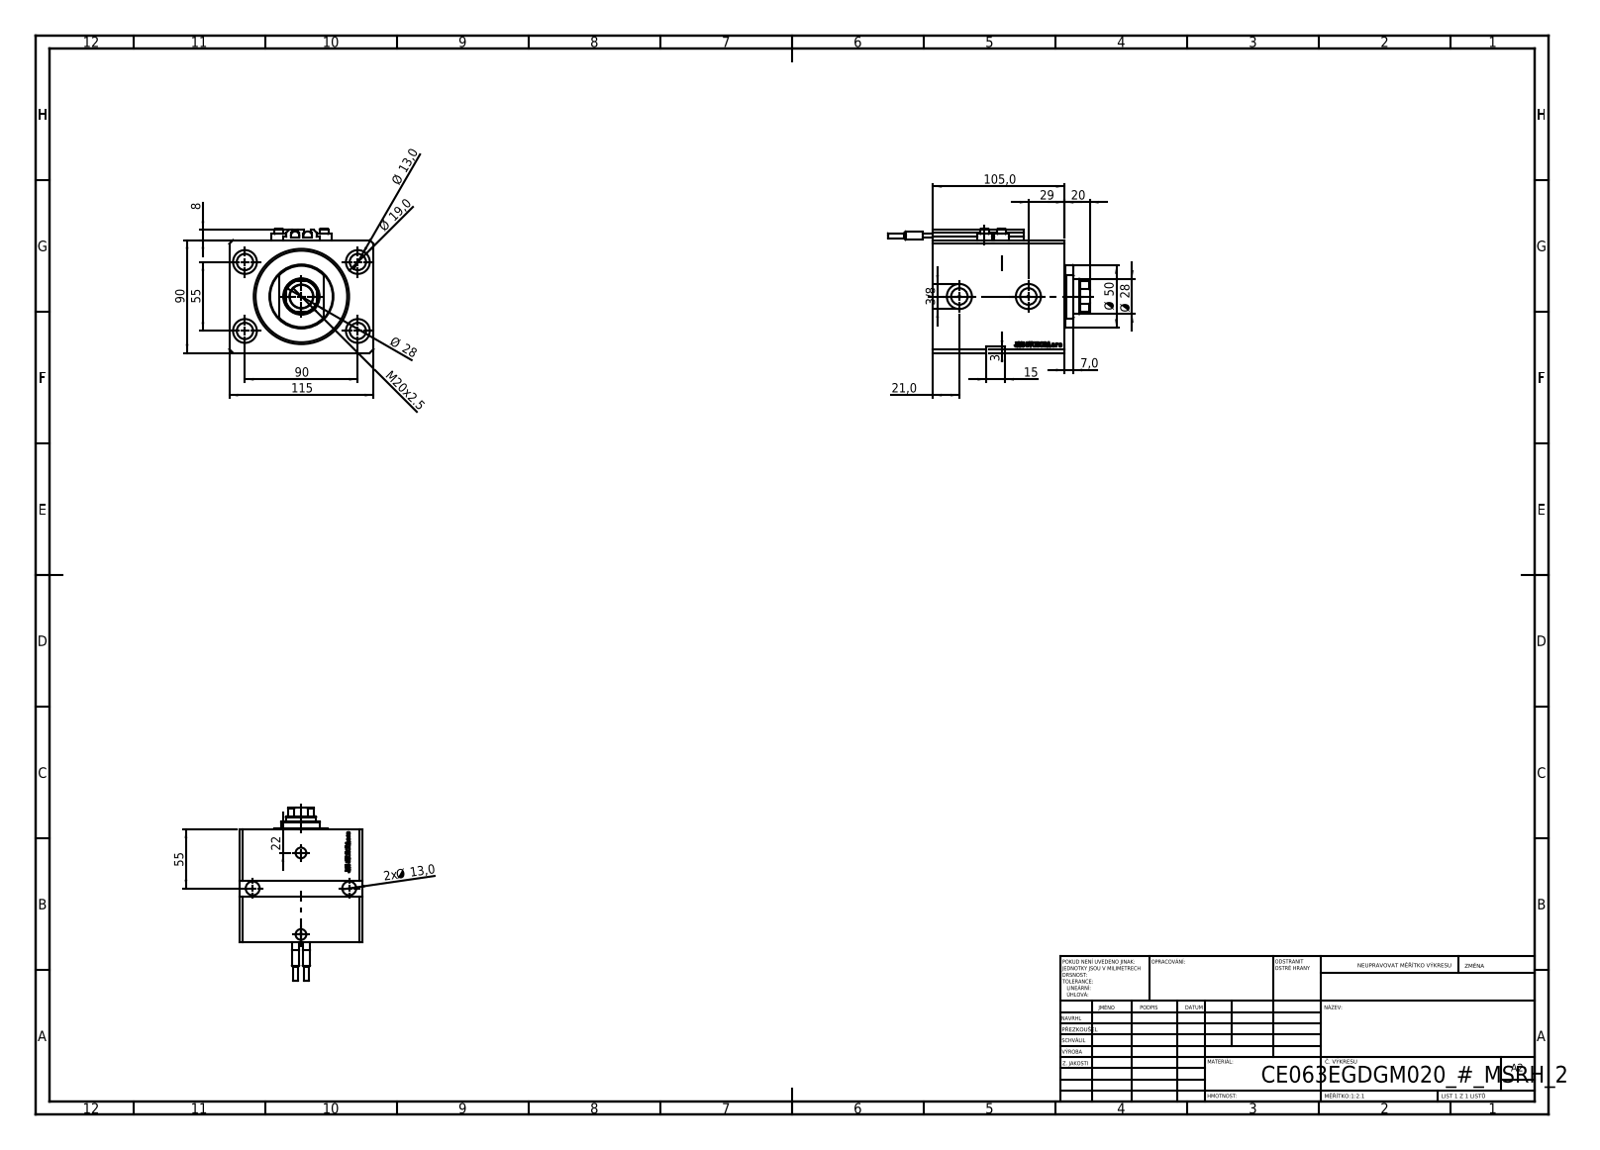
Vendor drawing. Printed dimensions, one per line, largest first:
115
105,0
90
90
55
55
Ø 50
29
Ø 28
Ø 28
22
21,0
M20x2.5
20
Ø 19,0
15
Ø 13,0
2x Ø 13,0
8
7,0
3
3/8
